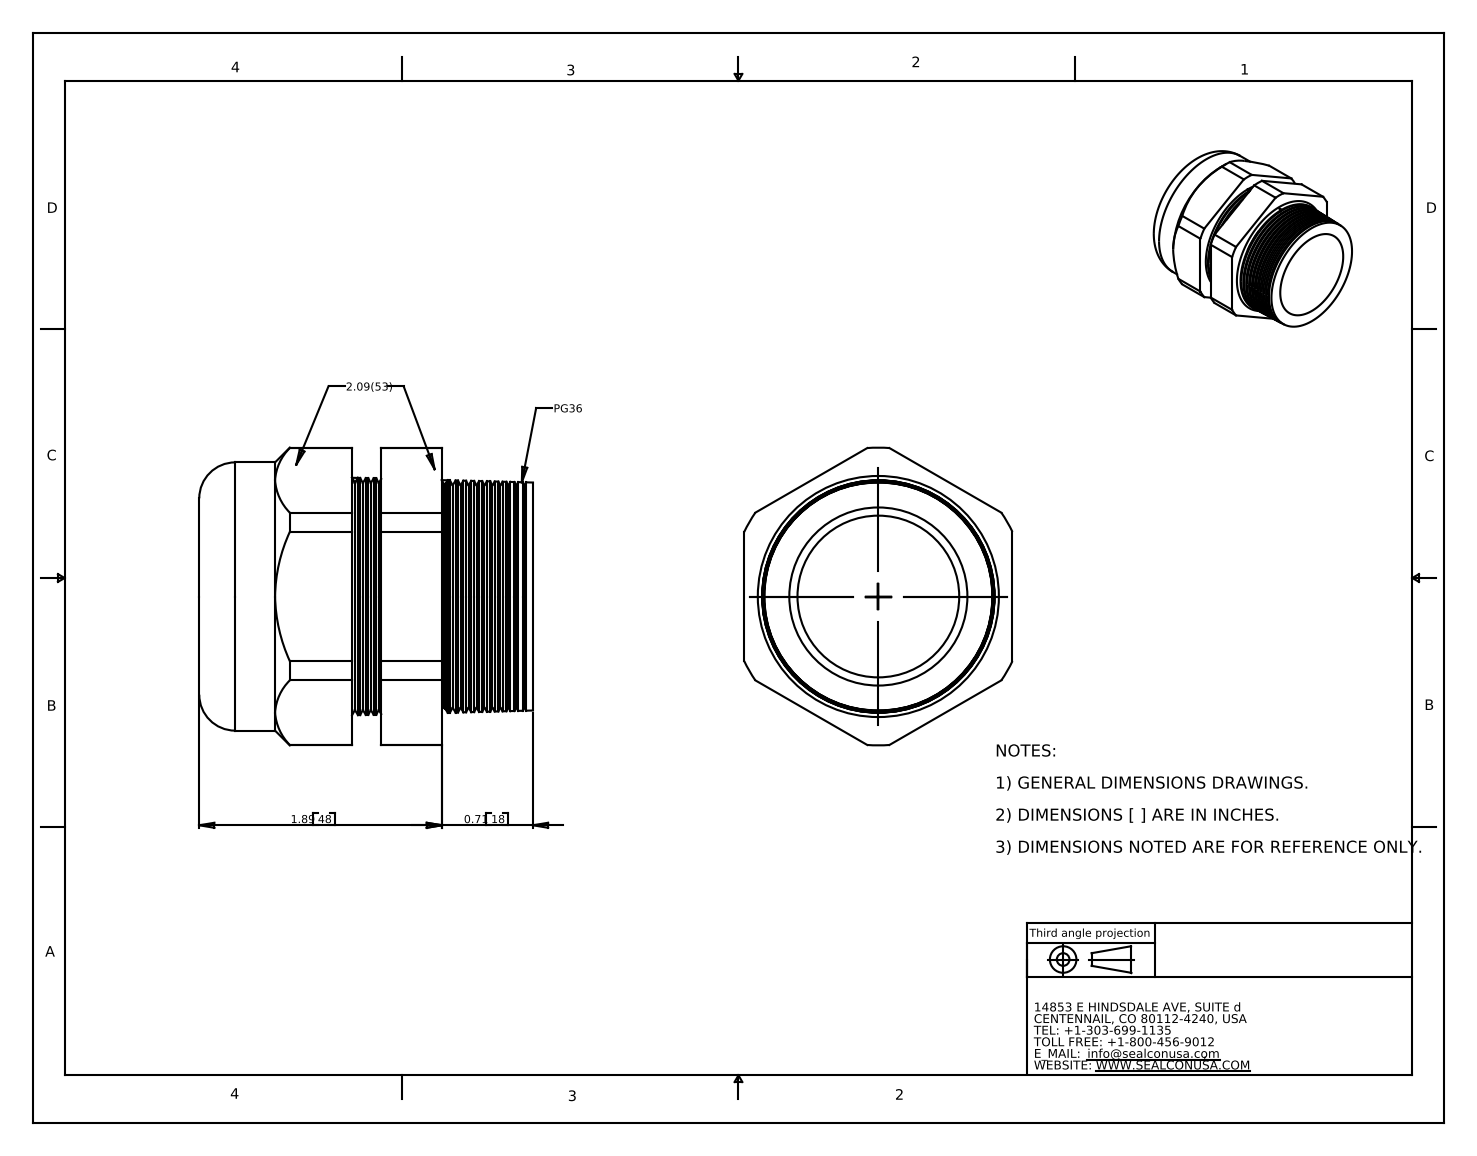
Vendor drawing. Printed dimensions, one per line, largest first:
1.89 48
0.71 18
